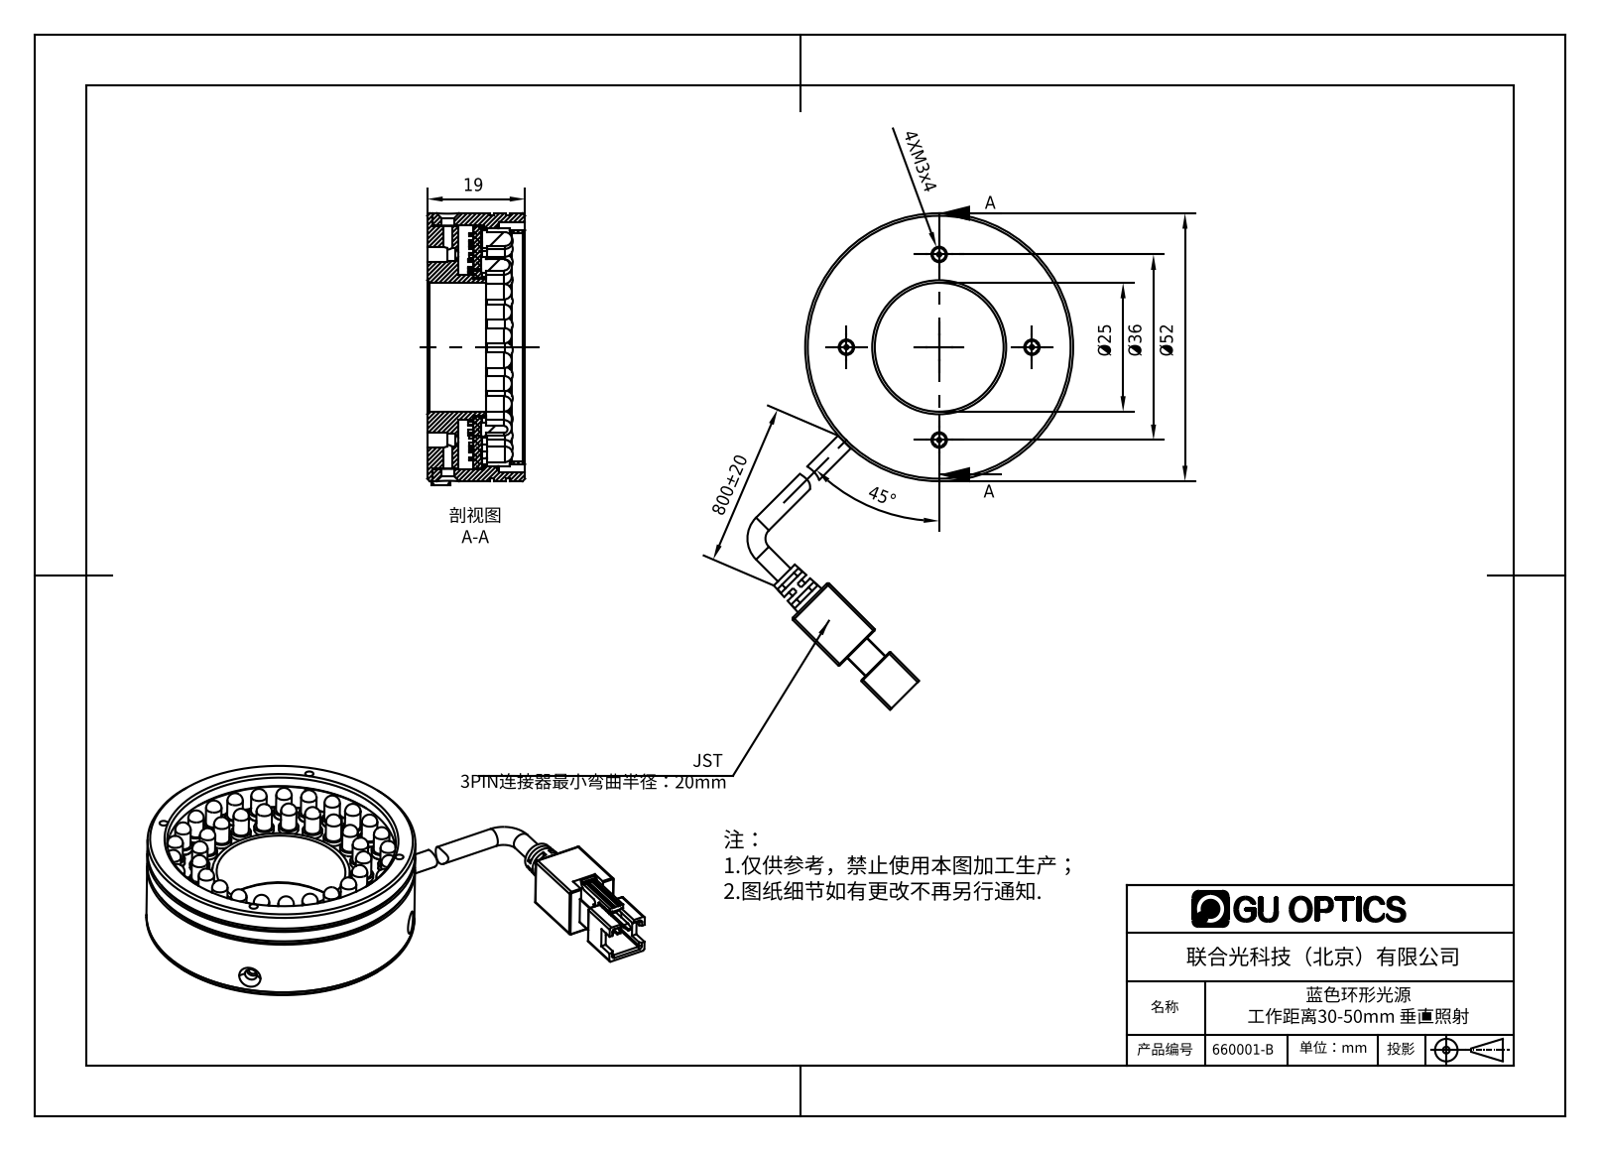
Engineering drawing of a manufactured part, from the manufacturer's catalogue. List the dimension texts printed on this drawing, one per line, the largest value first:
800±20
Ø52
45°
Ø36
Ø25
19
4XM3x4
